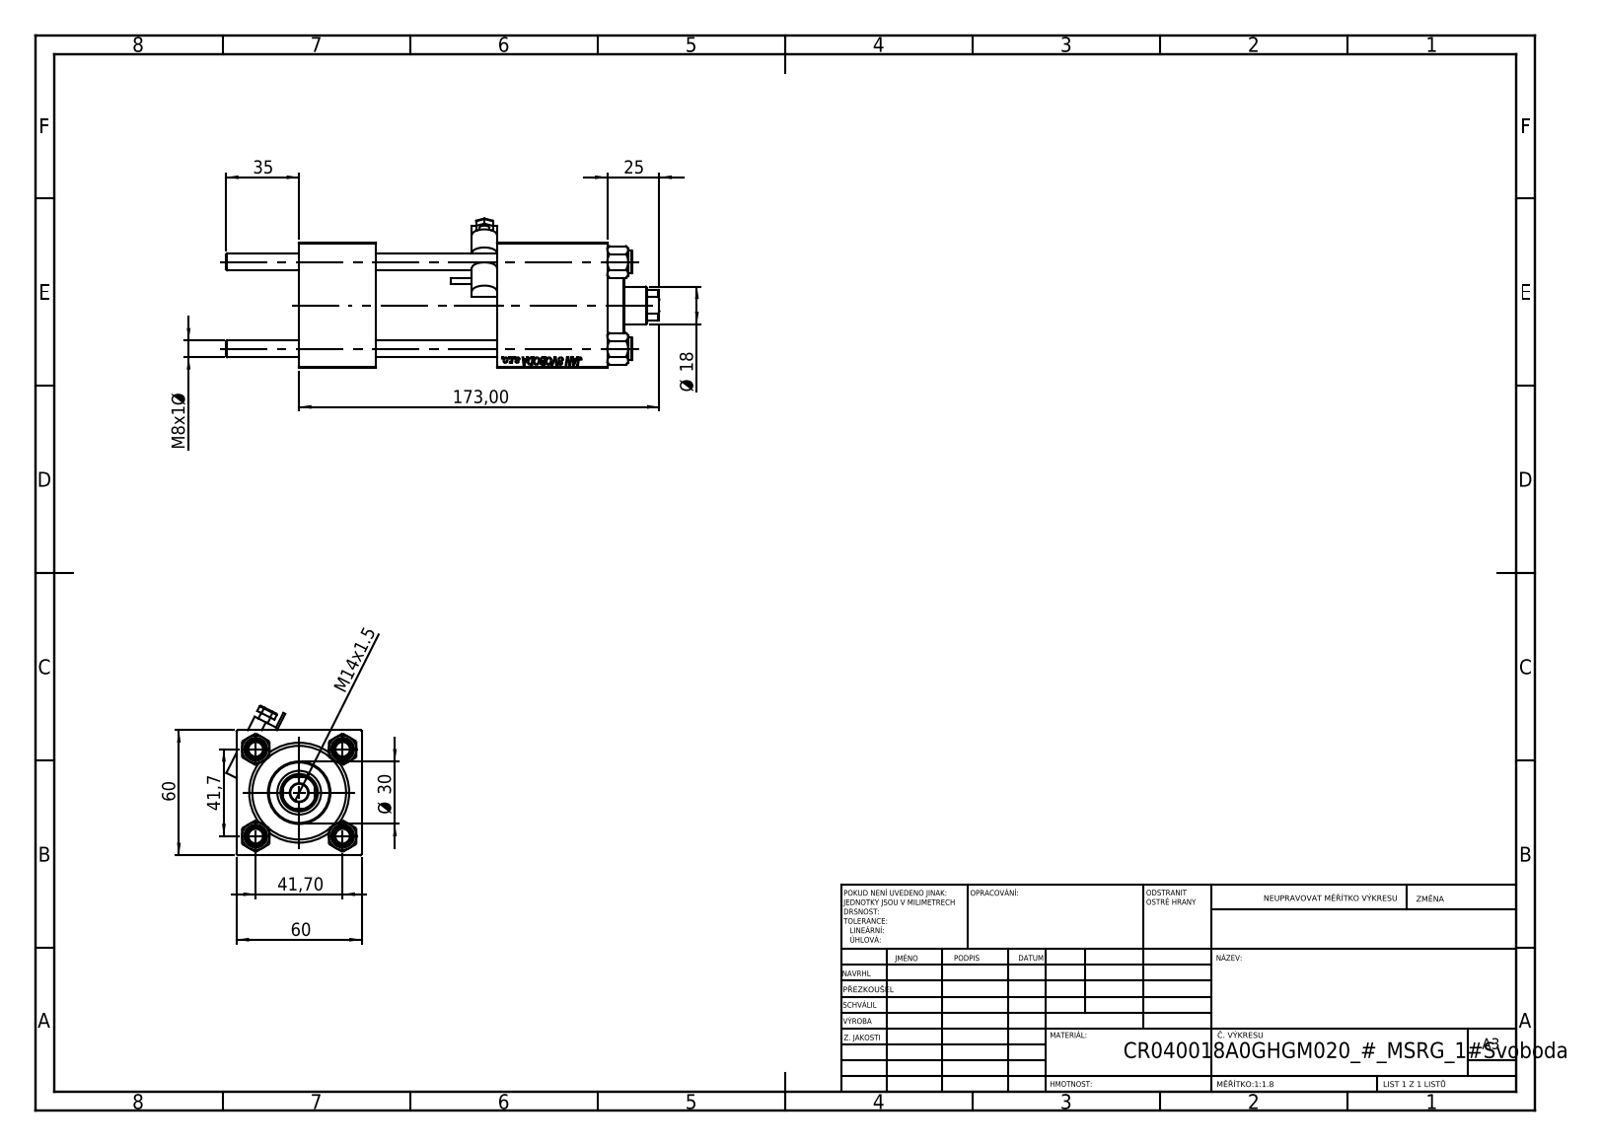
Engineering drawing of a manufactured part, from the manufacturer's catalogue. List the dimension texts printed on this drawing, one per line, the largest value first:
173,00
60
60
41,7
41,70
35
Ø 30
25
Ø 18
M14x1.5
M8x1 Ø
